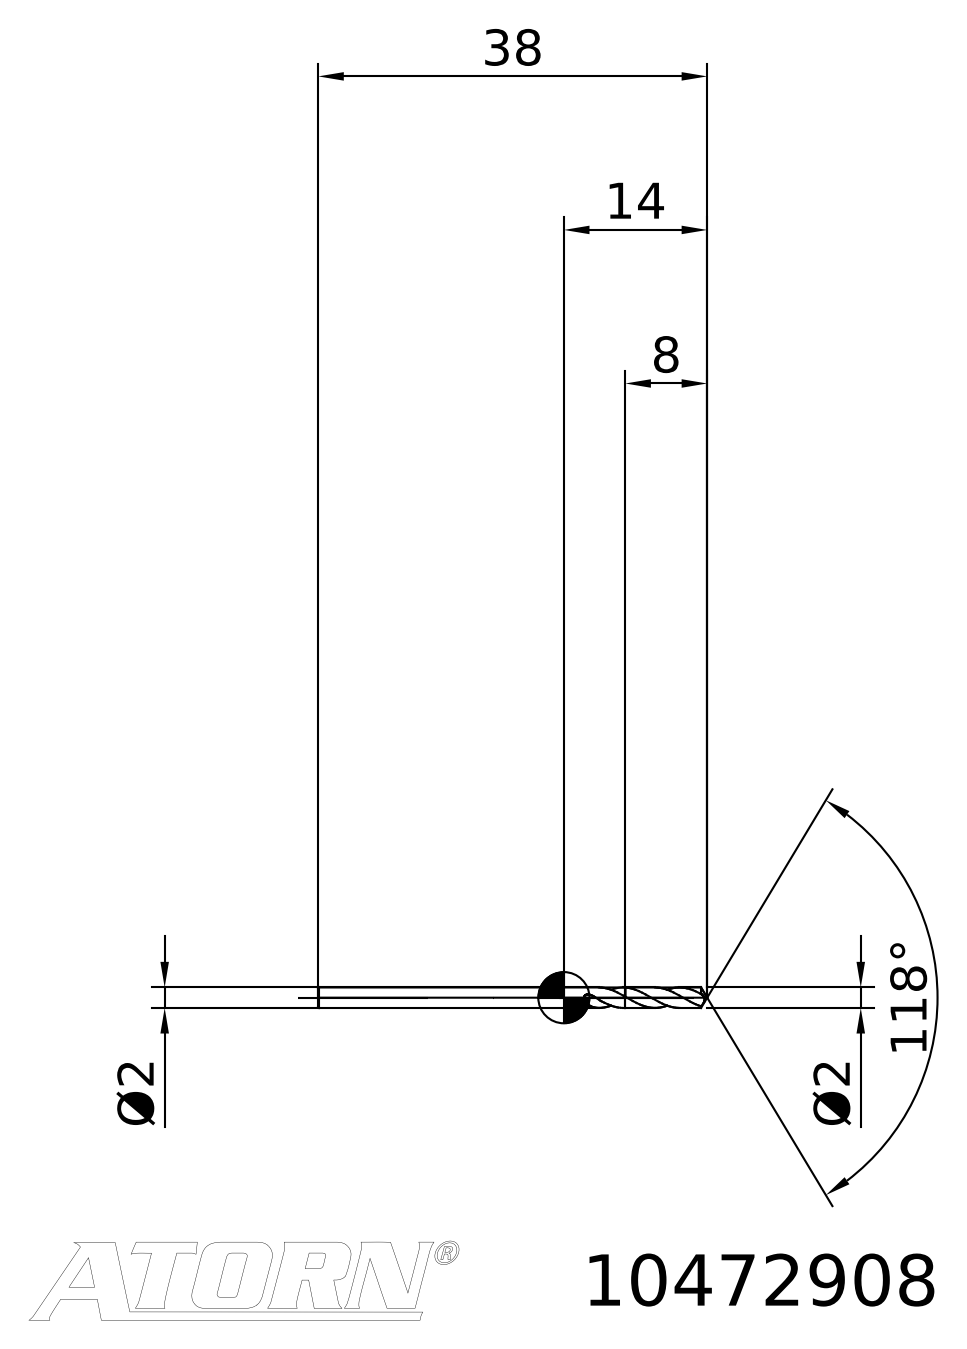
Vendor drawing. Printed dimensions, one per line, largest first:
118°
38
14
8
Ø2
Ø2
